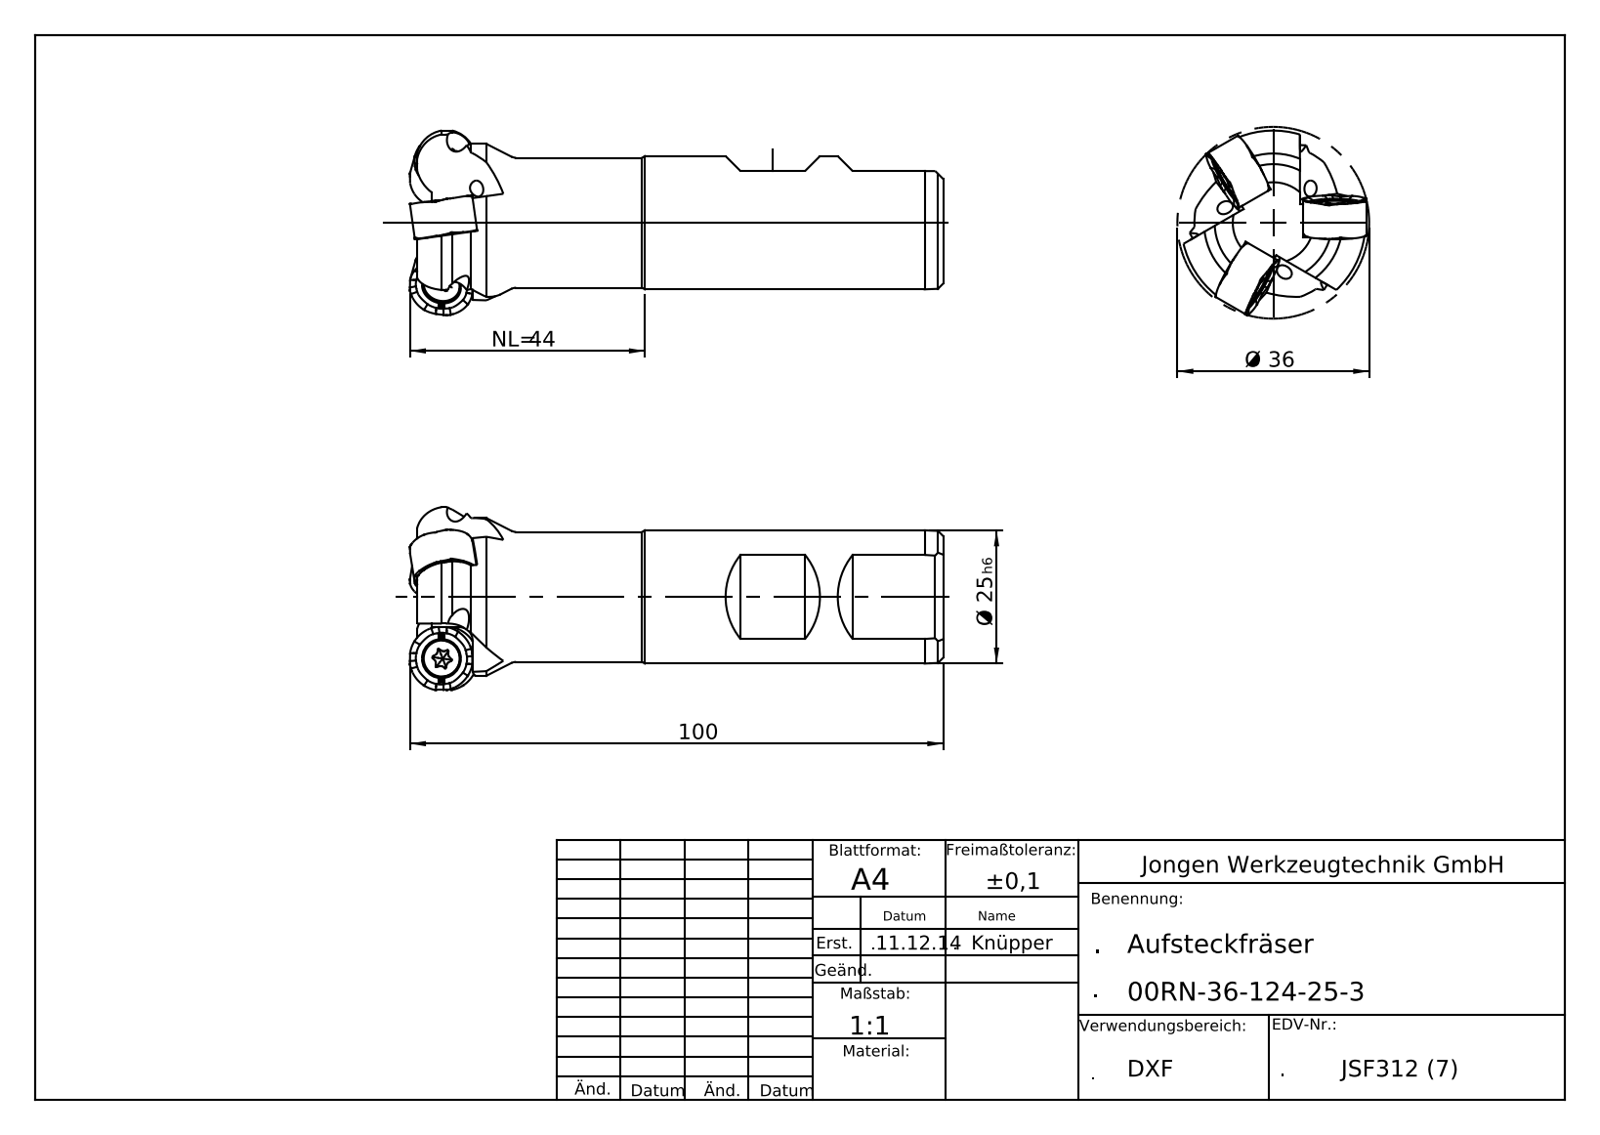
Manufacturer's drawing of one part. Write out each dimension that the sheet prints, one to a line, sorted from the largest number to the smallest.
100
NL= 44
Ø 36
Ø 25 h6
